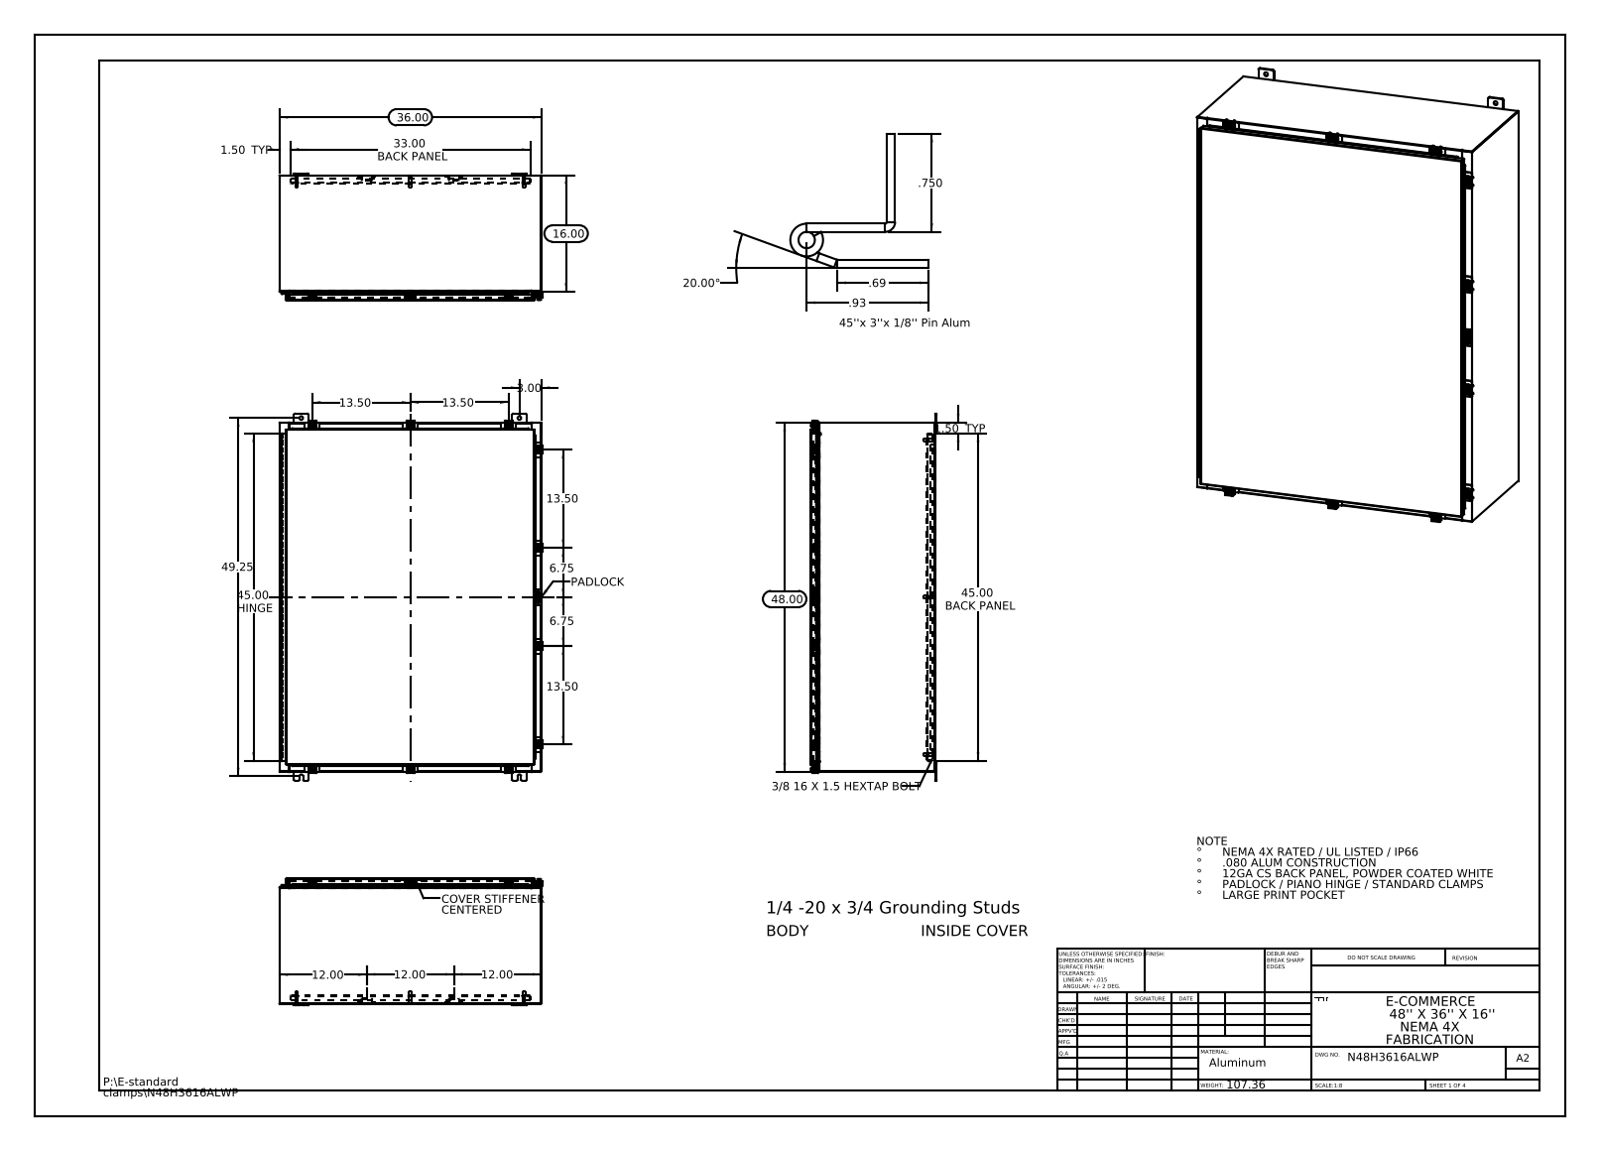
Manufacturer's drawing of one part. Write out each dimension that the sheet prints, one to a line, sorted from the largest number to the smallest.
49.25
48.00
45.00 HINGE
45.00 BACK PANEL
36.00
33.00 BACK PANEL
20.00°
16.00
13.50
13.50
13.50
13.50
12.00
12.00
12.00
6.75
6.75
3.00
1.50 TYP
1.50 TYP
.93
.750
.69
